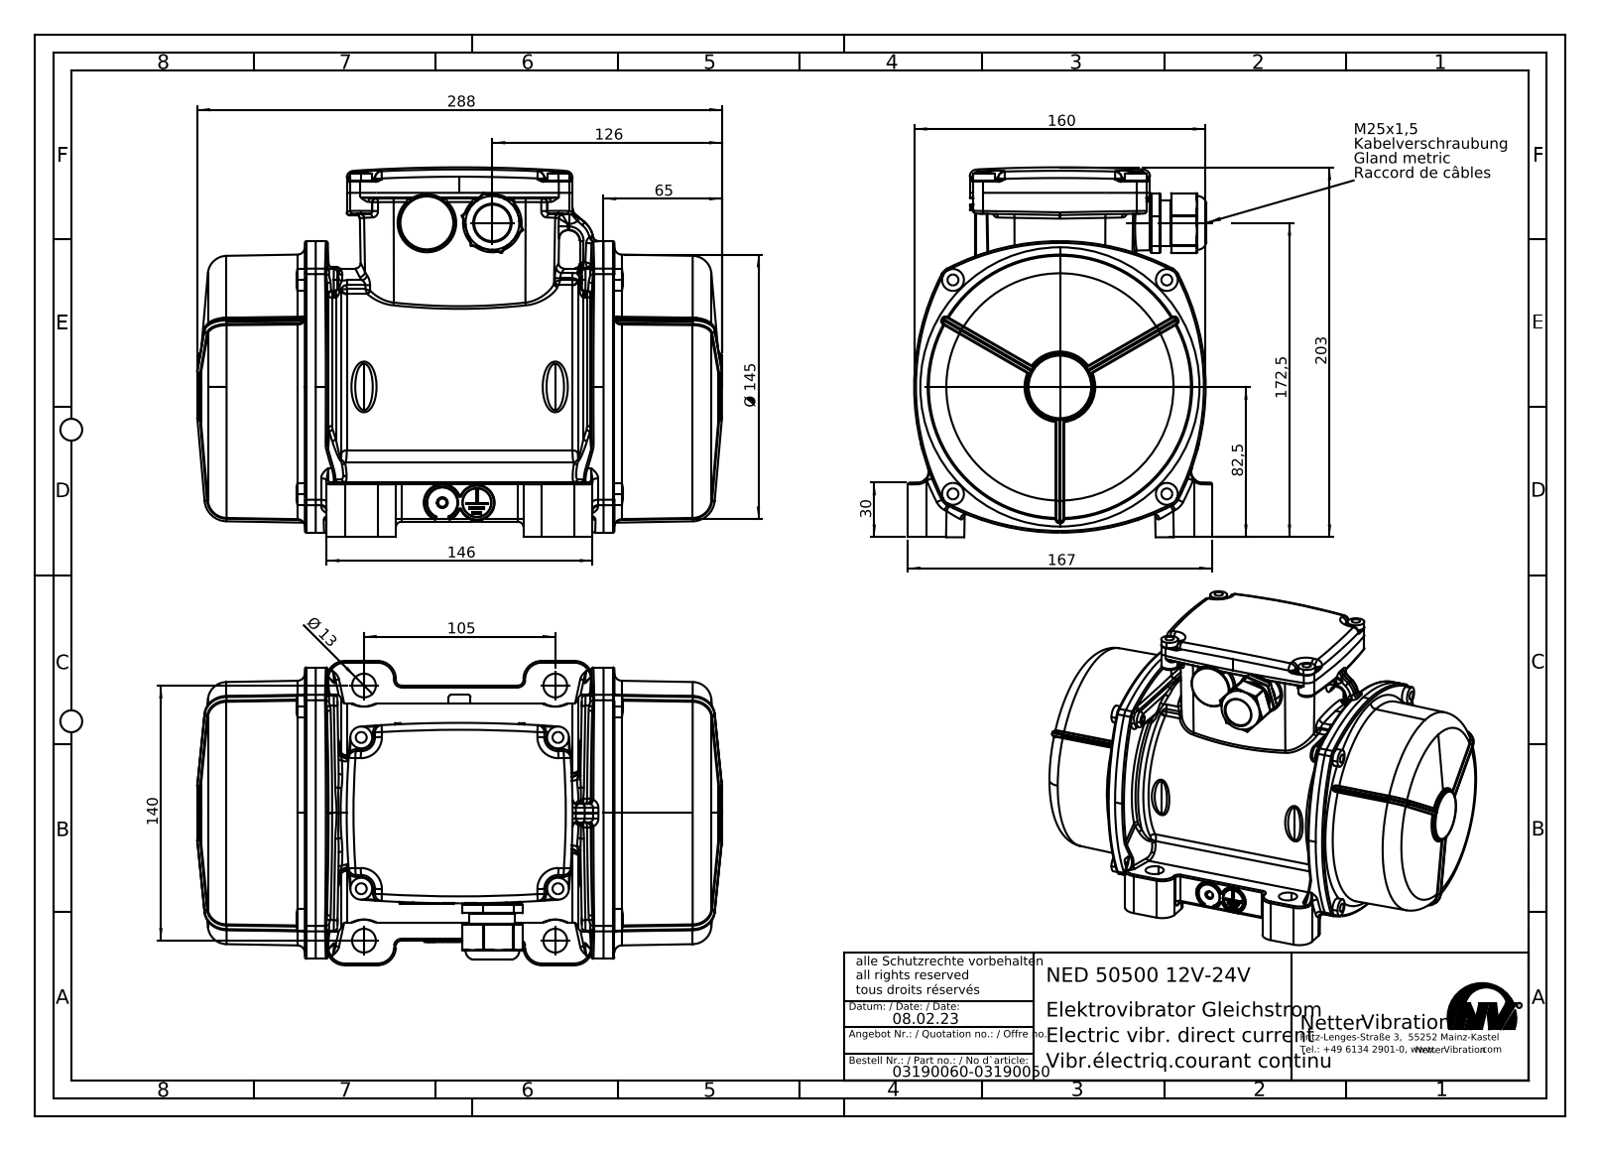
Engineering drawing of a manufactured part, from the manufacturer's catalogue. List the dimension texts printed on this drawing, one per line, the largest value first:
288
203
172,5
167
160
146
Ø 145
140
126
105
82,5
65
30
Ø 13
